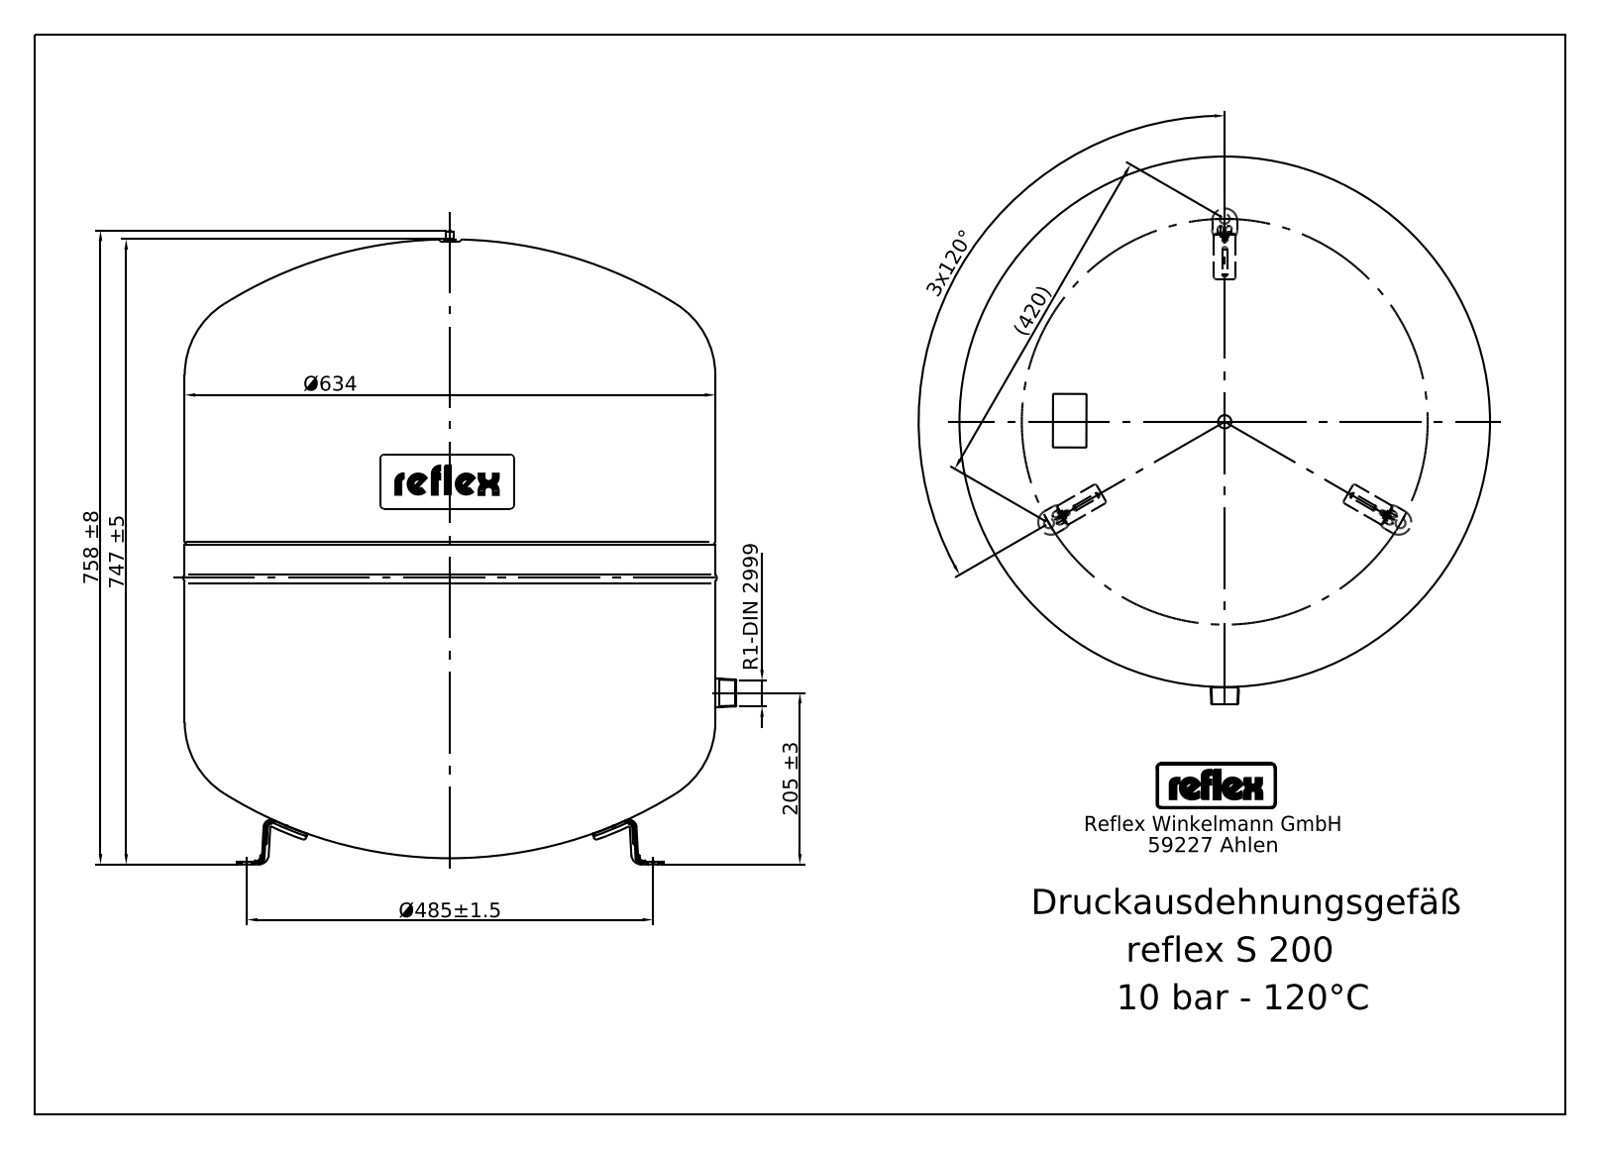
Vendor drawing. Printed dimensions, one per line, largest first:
758 ±8
747 ±5
Ø634
Ø485±1.5
(420)
205 ±3
3x120°
R1-DIN 2999
